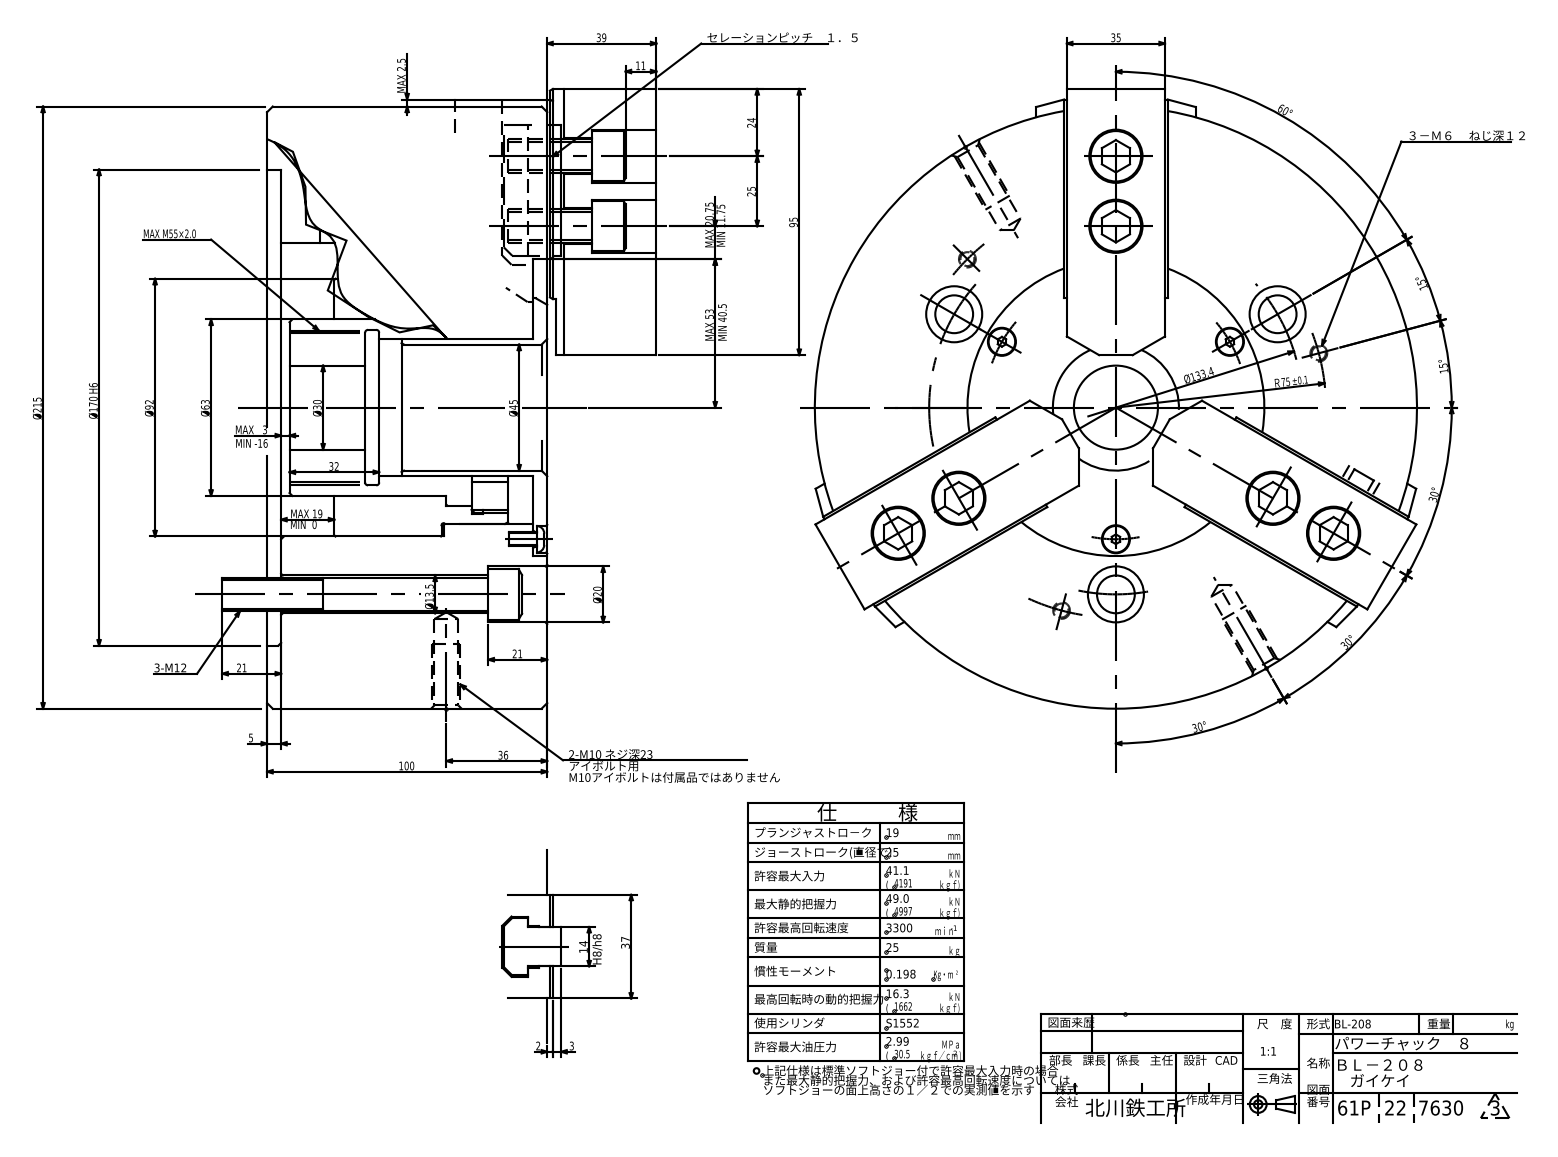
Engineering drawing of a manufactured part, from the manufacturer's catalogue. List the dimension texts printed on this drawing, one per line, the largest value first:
Ø215
Ø170 H6
Ø133.4
100
95
Ø92
Ｒ75 ±0.1
Ø63
60°
MAX 53
Ø45
39
37
36
35
32
Ø30
30°
30°
30°
25
24
21
21
MAX 20.75
Ø20
MAX 19
15°
15°
14
Ø13.5
11
5
MAX 3
3
MAX 2.5
2
